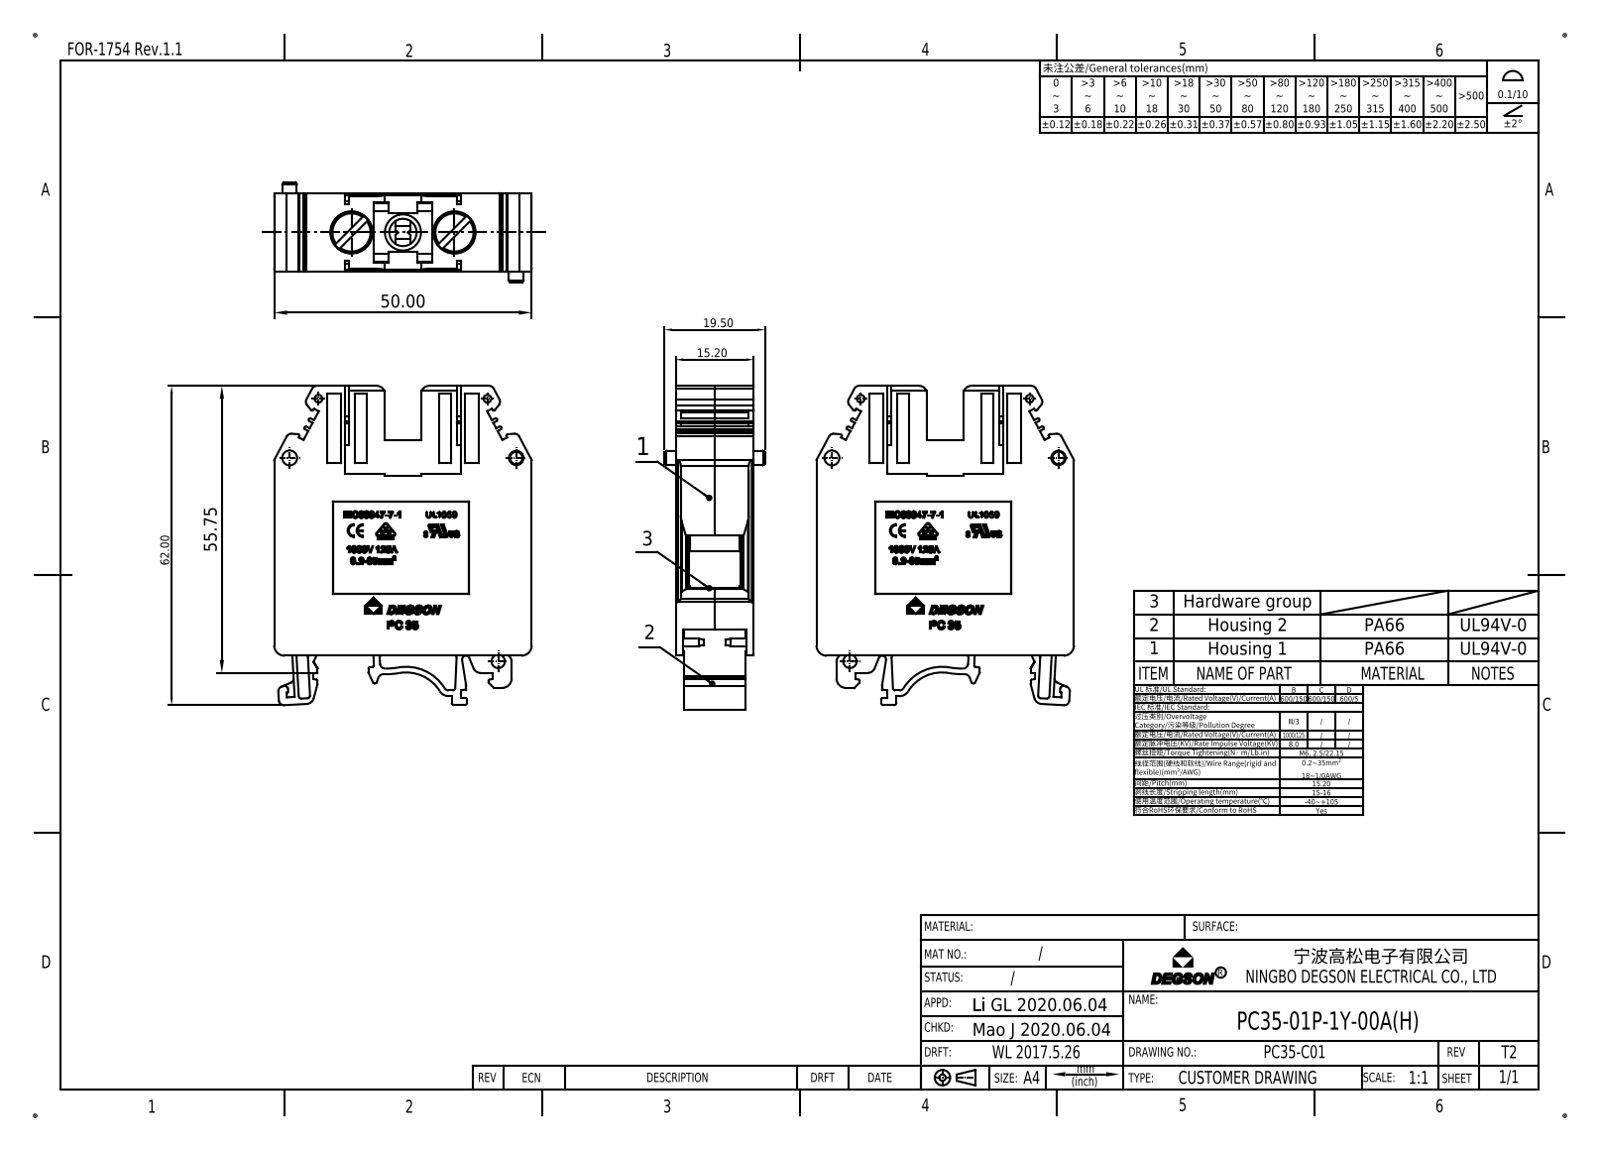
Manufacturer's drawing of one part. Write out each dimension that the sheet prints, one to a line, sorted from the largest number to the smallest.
62.00
55.75
50.00
19.50
15.20
